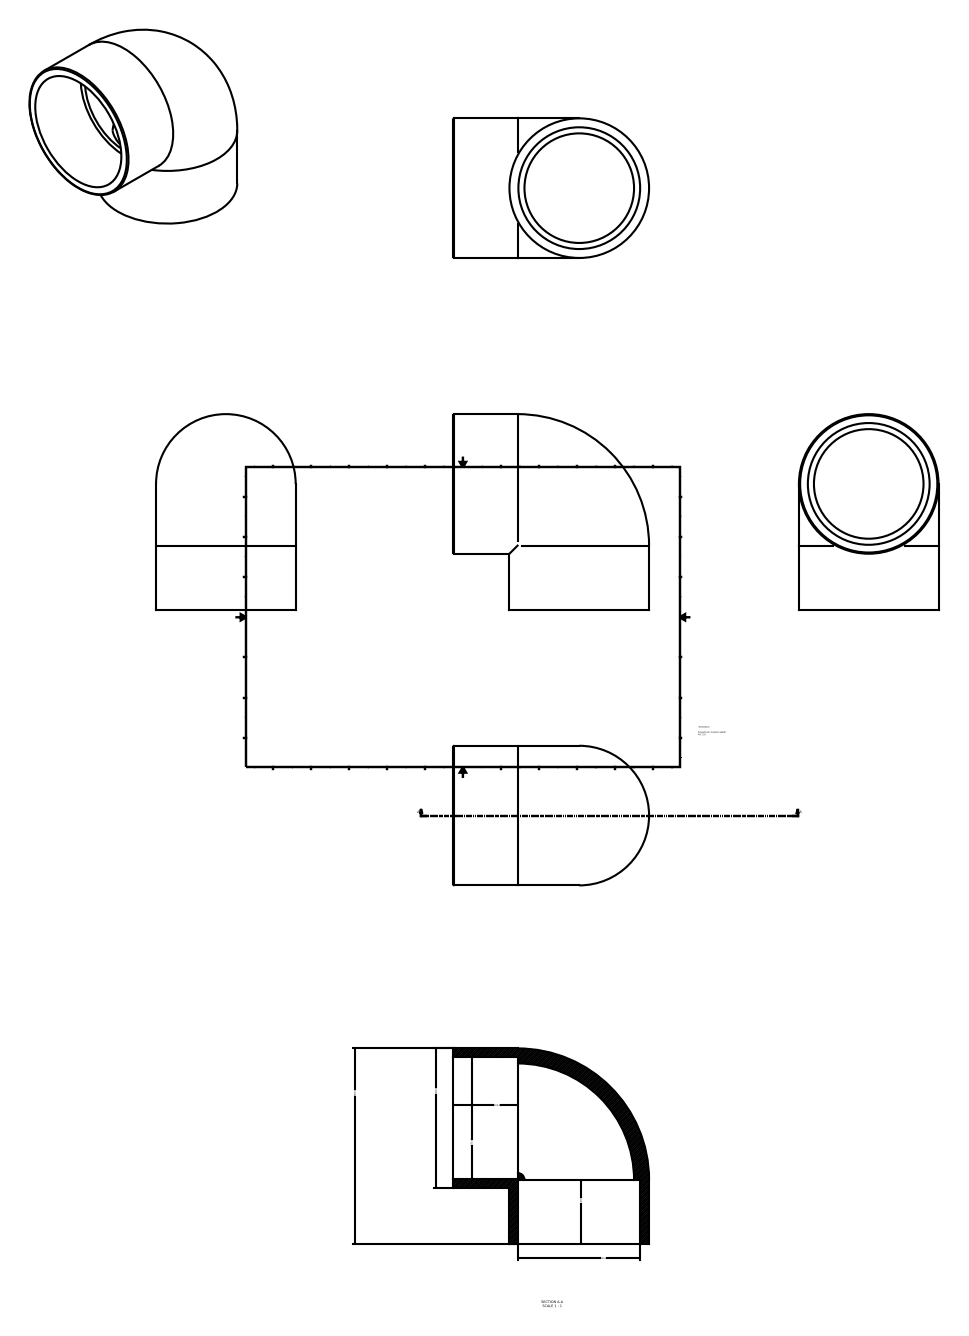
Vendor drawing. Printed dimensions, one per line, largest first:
362.00
258.00
225.00
225.00
119.00
119.00
